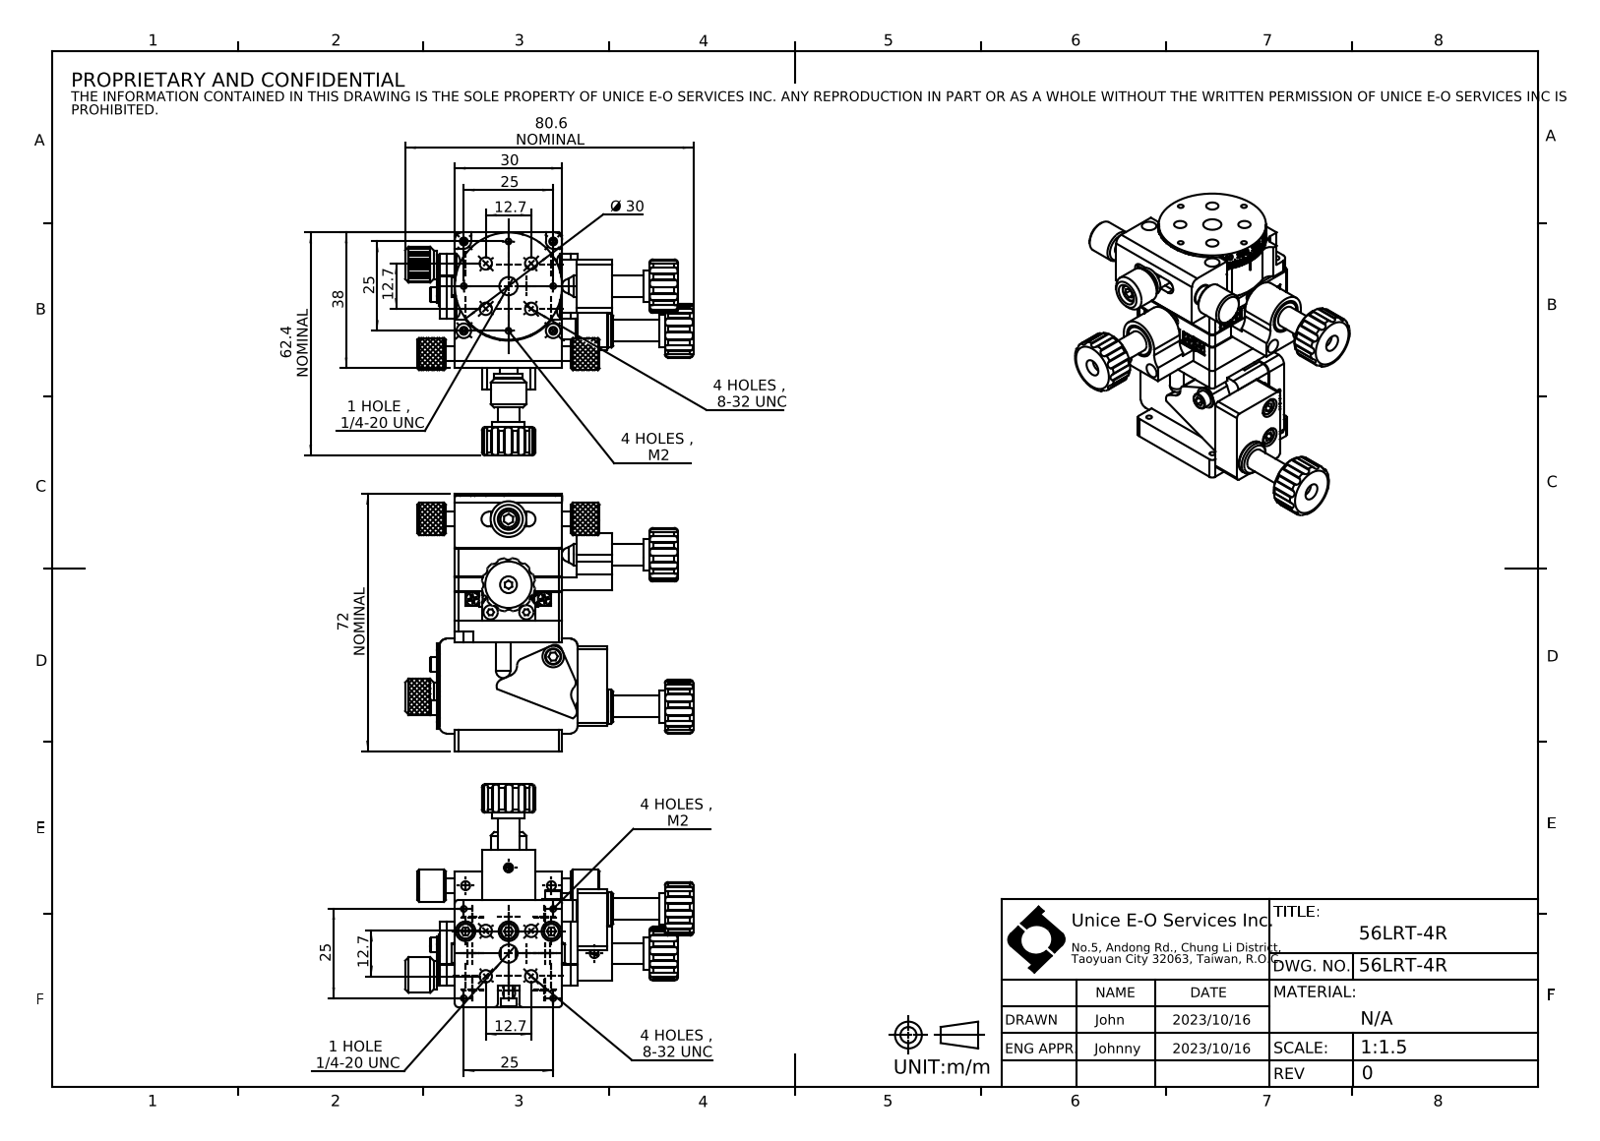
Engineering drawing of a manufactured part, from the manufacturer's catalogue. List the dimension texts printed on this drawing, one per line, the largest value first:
80.6 NOMINAL
72 NOMINAL
62.4 NOMINAL
38
Ø 30
30
25
25
25
25
12.7
12.7
12.7
12.7
4 HOLES , 8-32 UNC
4 HOLES , M2
4 HOLES , M2
4 HOLES , 8-32 UNC
1 HOLE , 1/4-20 UNC
1 HOLE 1/4-20 UNC
